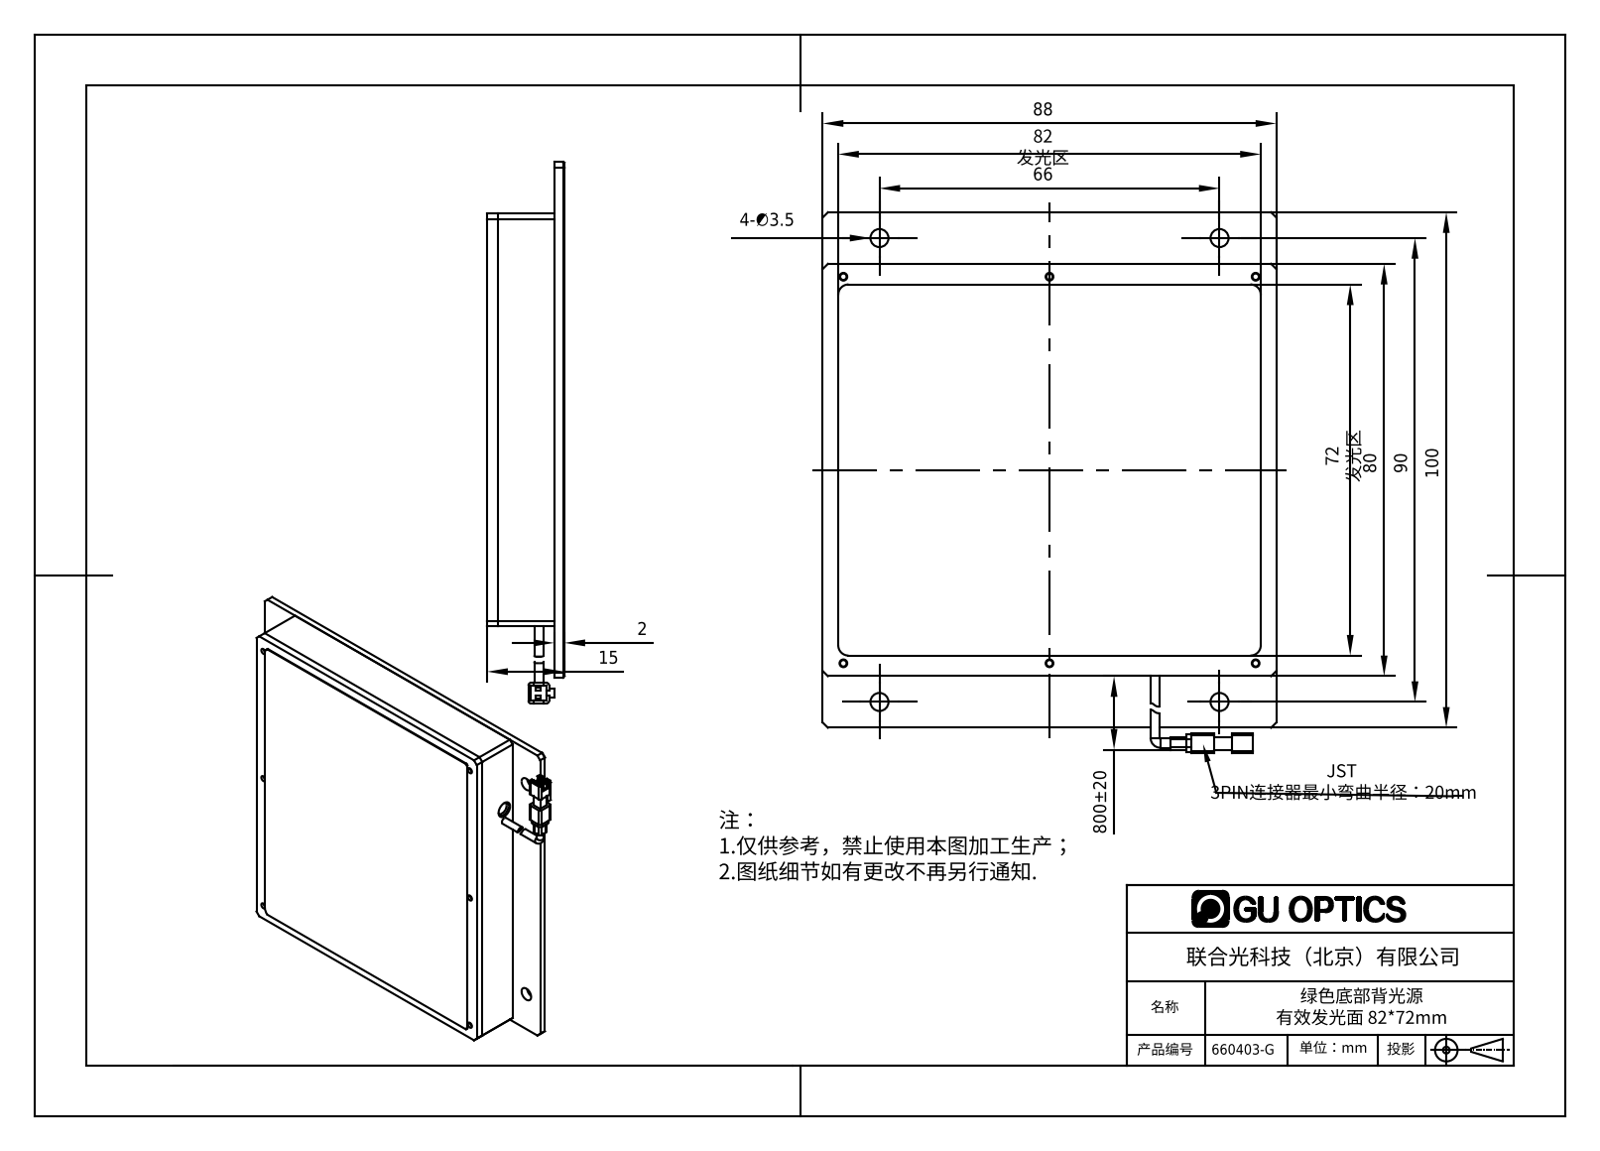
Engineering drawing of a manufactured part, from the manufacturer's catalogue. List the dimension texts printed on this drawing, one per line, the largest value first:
800±20
100
90
88
82 发光区
80
72 发光区
66
15
4-∅3.5
2
